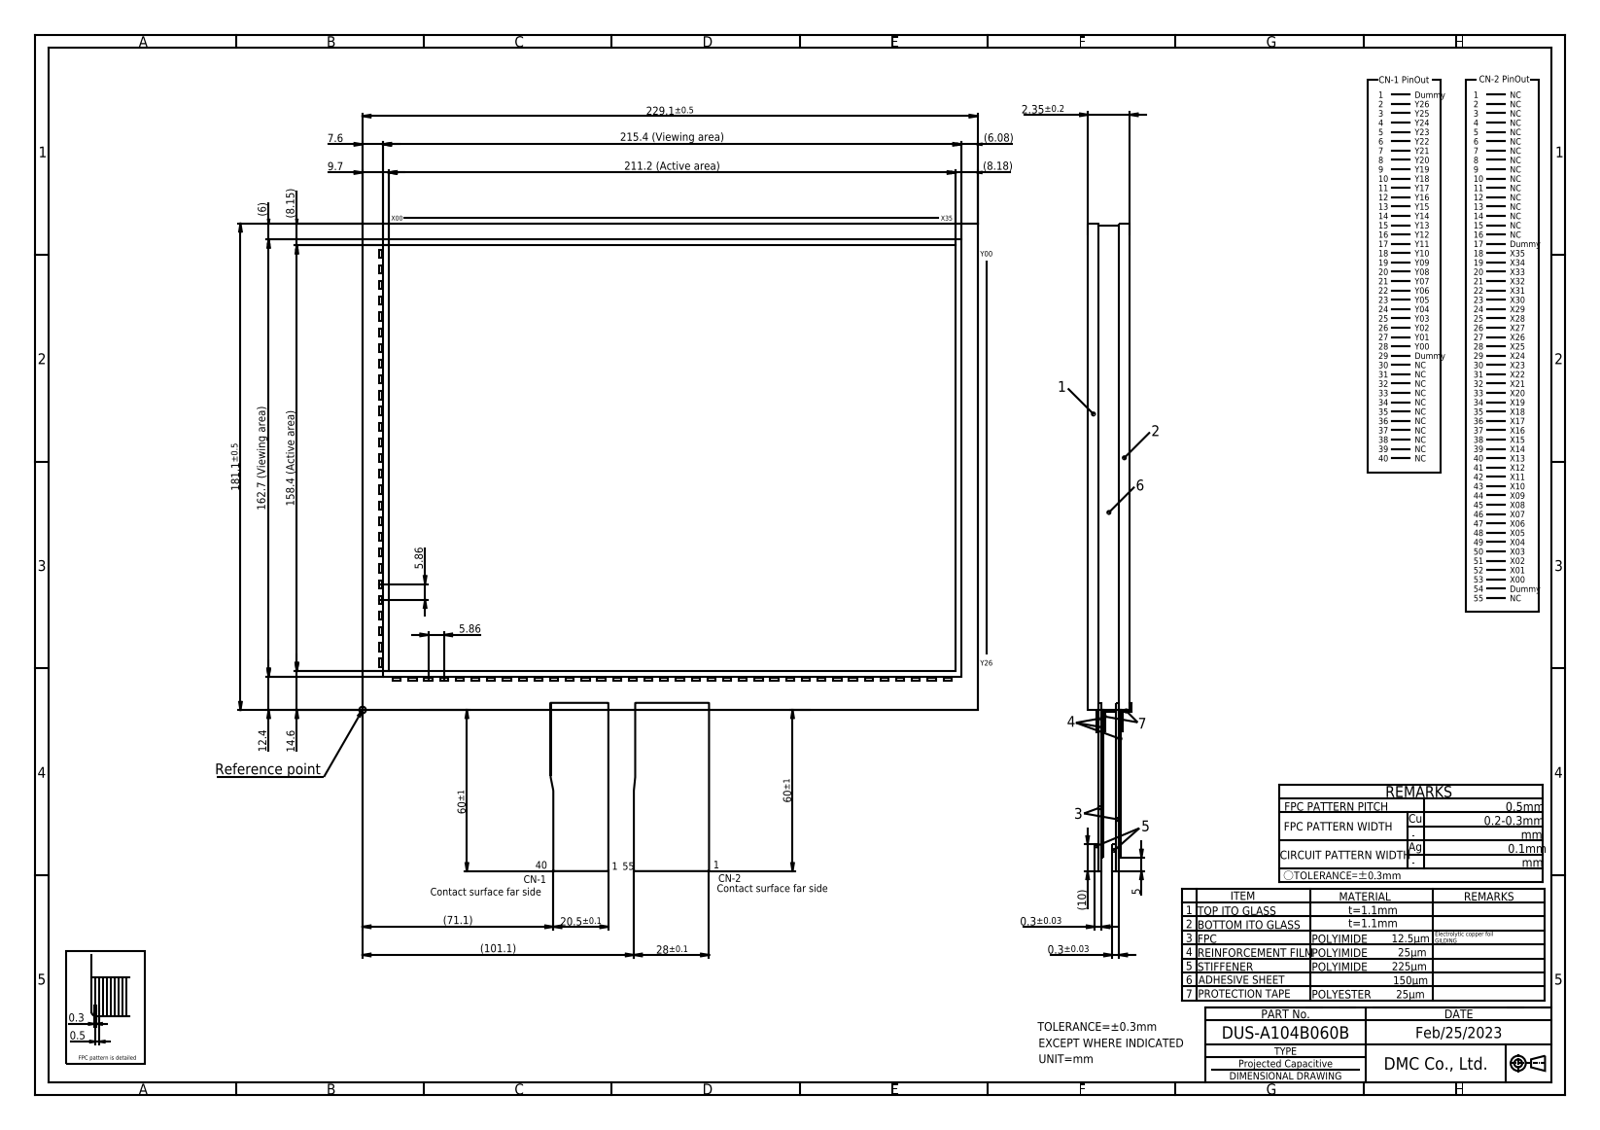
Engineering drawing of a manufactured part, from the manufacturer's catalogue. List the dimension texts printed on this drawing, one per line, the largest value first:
229.1±0.5
215.4 (Viewing area)
211.2 (Active area)
181.1±0.5
162.7 (Viewing area)
158.4 (Active area)
(101.1)
(71.1)
60±1
60±1
28±0.1
20.5±0.1
14.6
12.4
(10)
9.7
(8.18)
(8.15)
7.6
(6.08)
(6)
5.86
5.86
5
2.35±0.2
0.5
0.3
0.3±0.03
0.3±0.03
